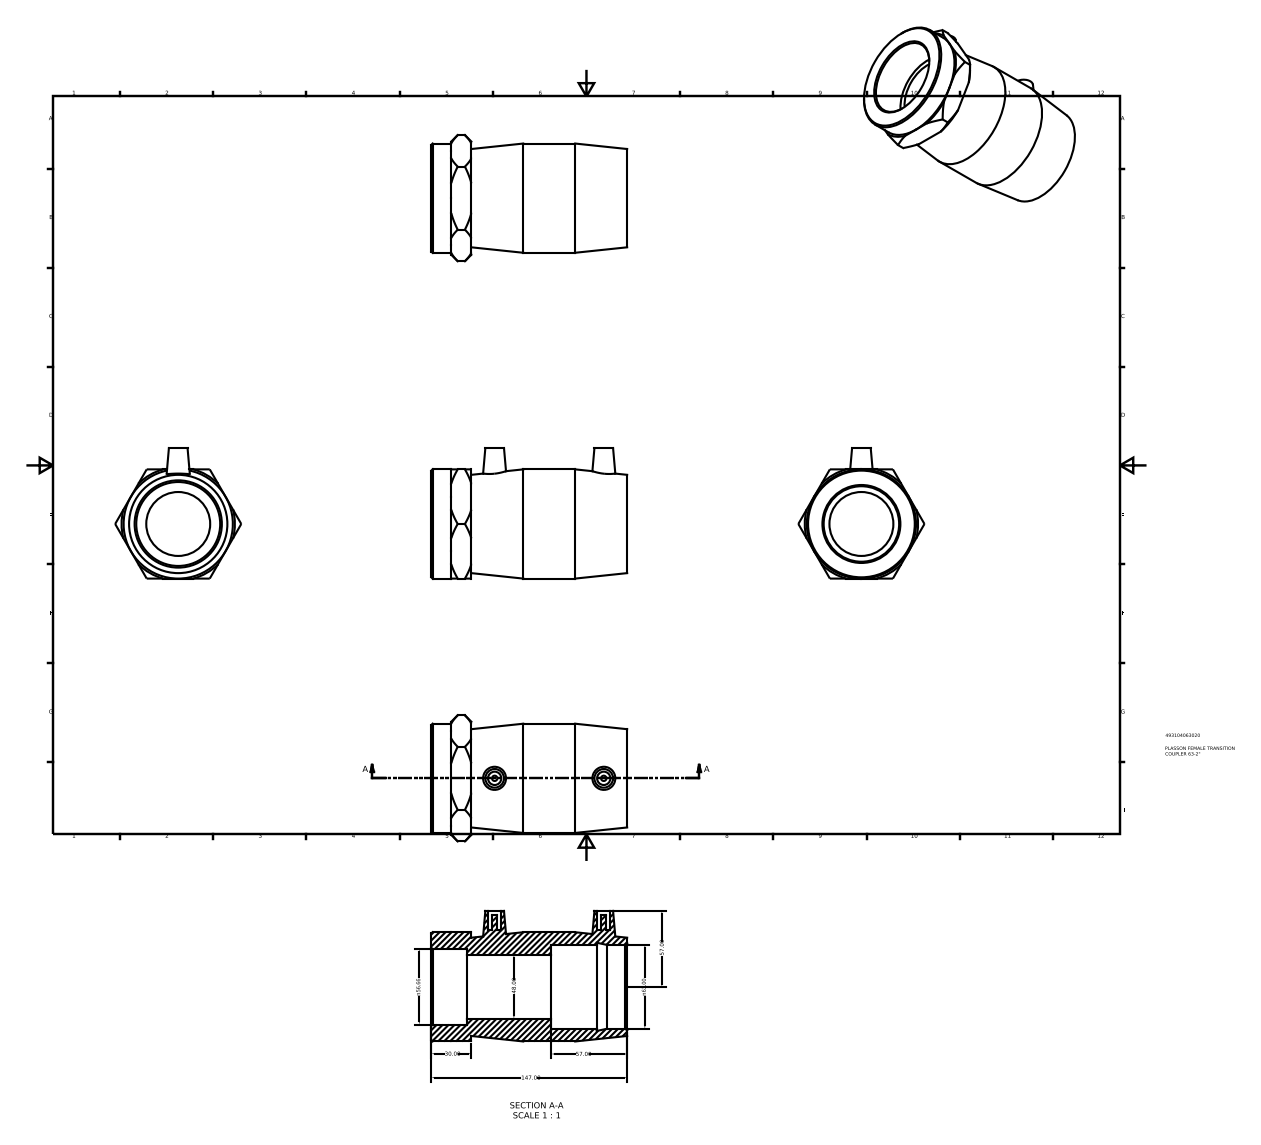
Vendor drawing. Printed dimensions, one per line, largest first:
147.00
n63.00
57.00
57.00
n56.66
48.00
30.00
